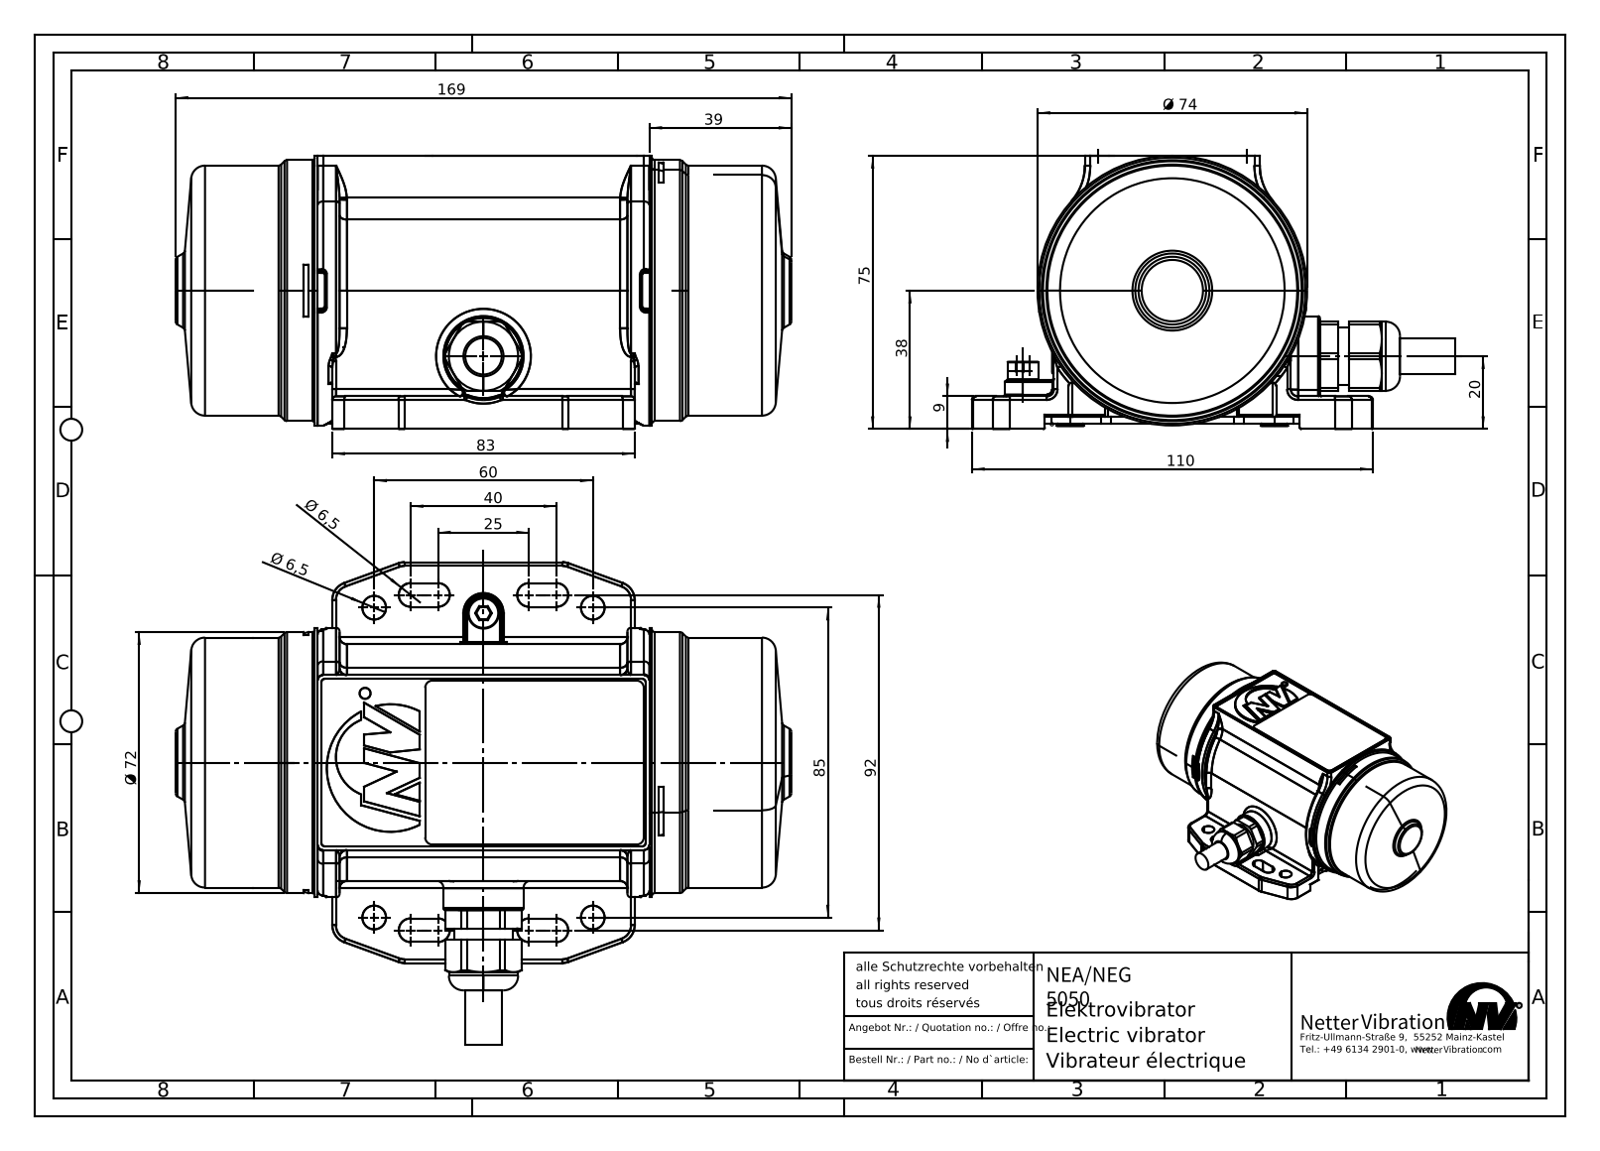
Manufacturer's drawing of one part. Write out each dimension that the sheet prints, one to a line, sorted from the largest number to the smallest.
169
110
92
85
83
75
Ø 74
Ø 72
60
40
39
38
25
20
9
Ø 6,5
Ø 6,5
